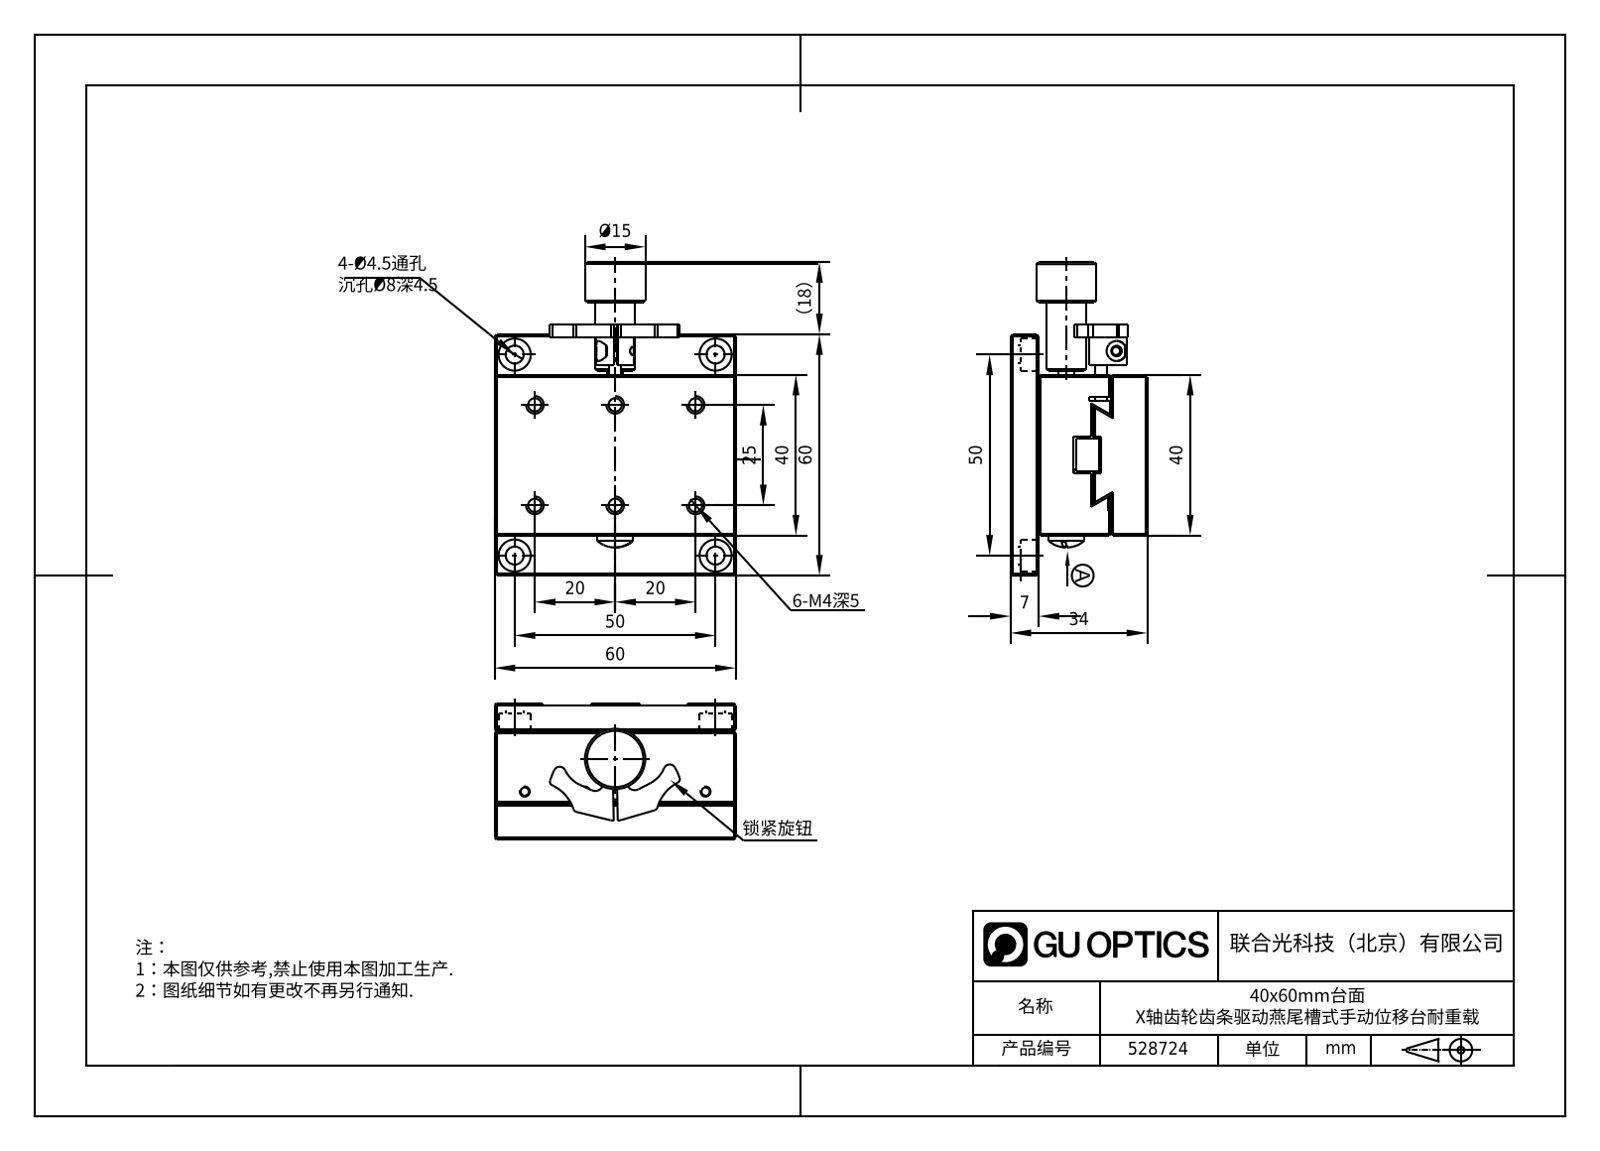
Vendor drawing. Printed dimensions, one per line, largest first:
60
60
50
50
40
40
34
25
20
20
（18）
Ø15
7
